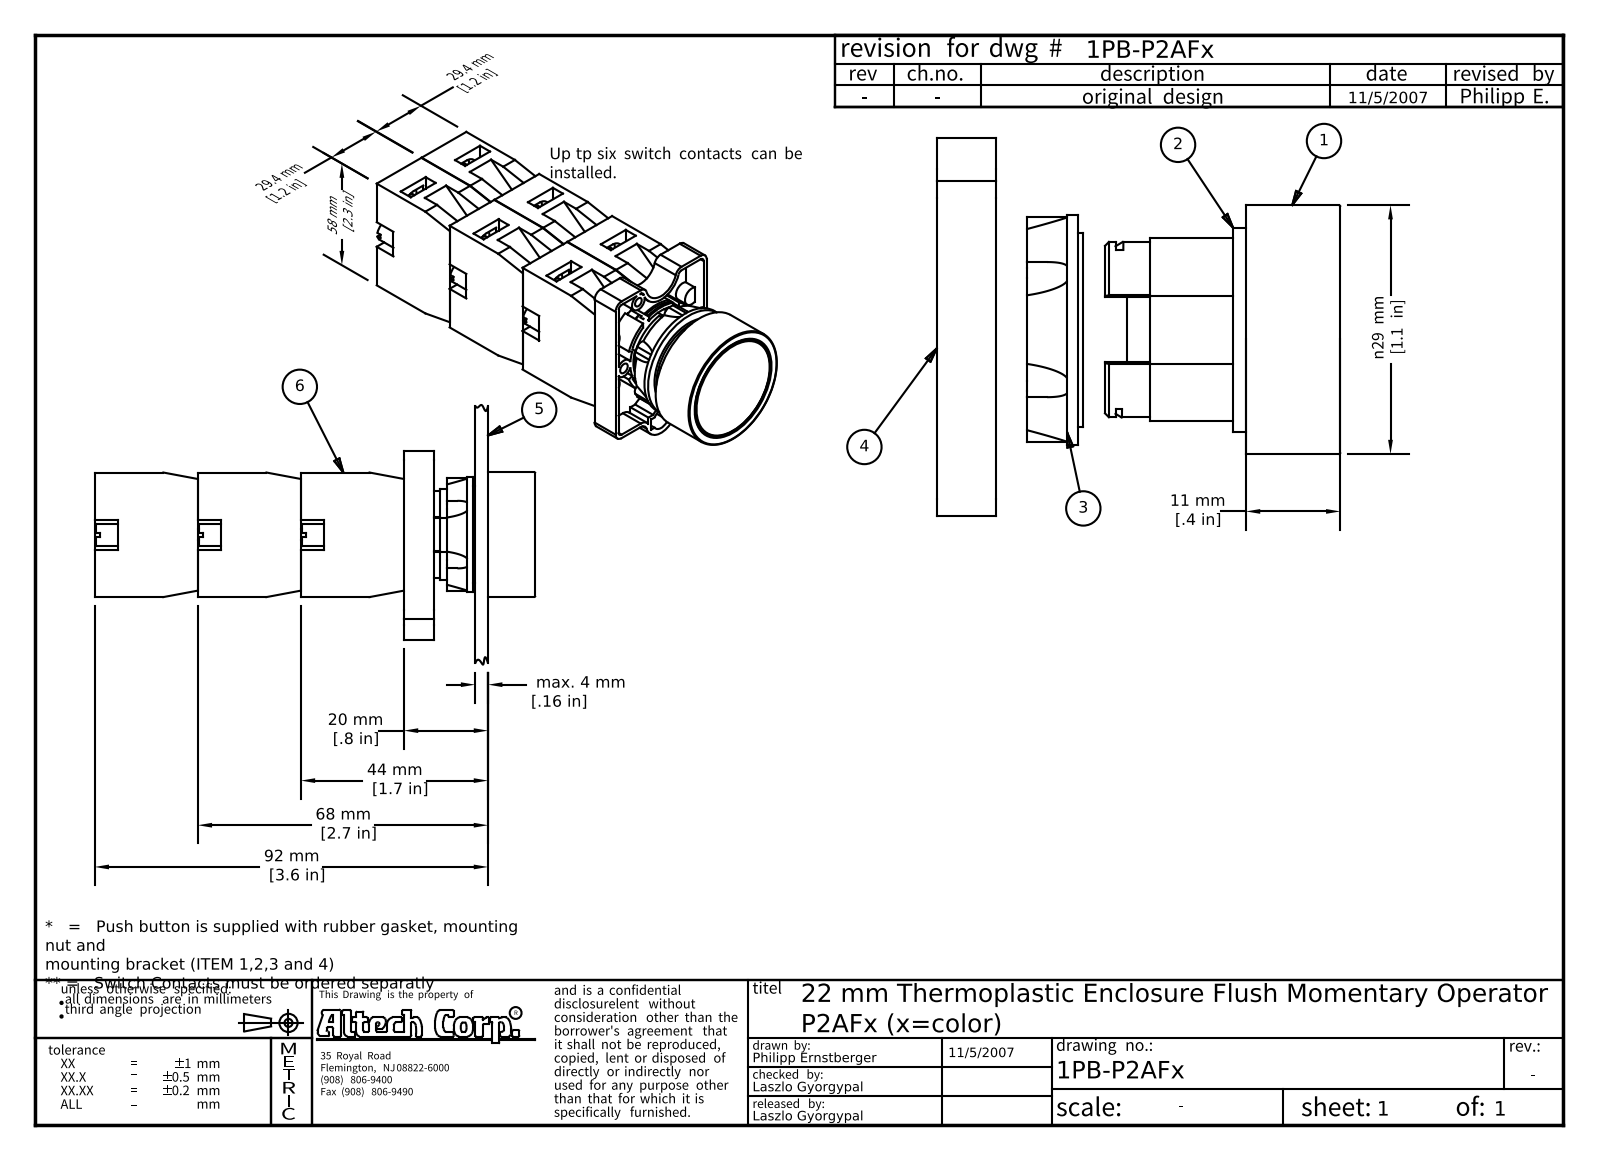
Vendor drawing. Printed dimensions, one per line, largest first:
92 mm [3.6 in]
68 mm [2.7 in]
58 mm [2.3 in]
44 mm [1.7 in]
29.4 mm [1.2 in]
29.4 mm [1.2 in]
n29 mm [1.1 in]
20 mm [.8 in]
11 mm [.4 in]
max. 4 mm [.16 in]
